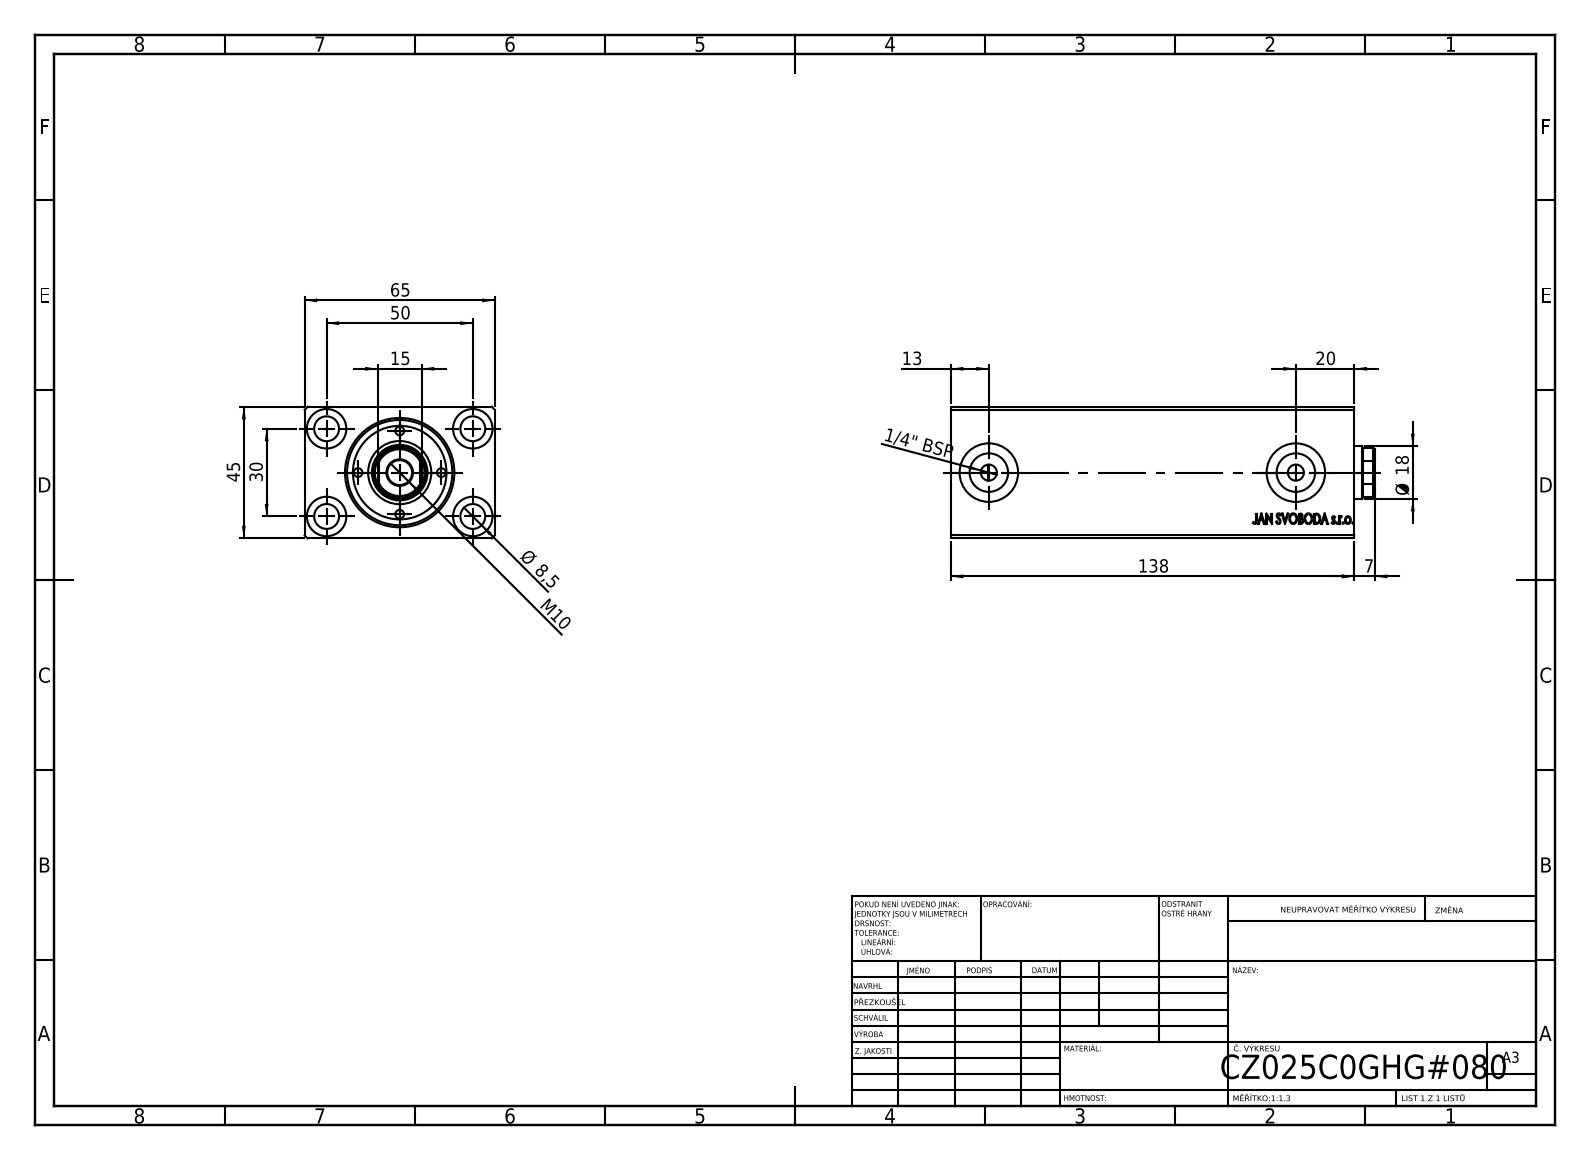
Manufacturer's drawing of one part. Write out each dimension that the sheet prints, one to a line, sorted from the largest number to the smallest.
138
65
50
45
30
20
Ø 18
15
13
M10
Ø 8,5
7
1/4" BSP
